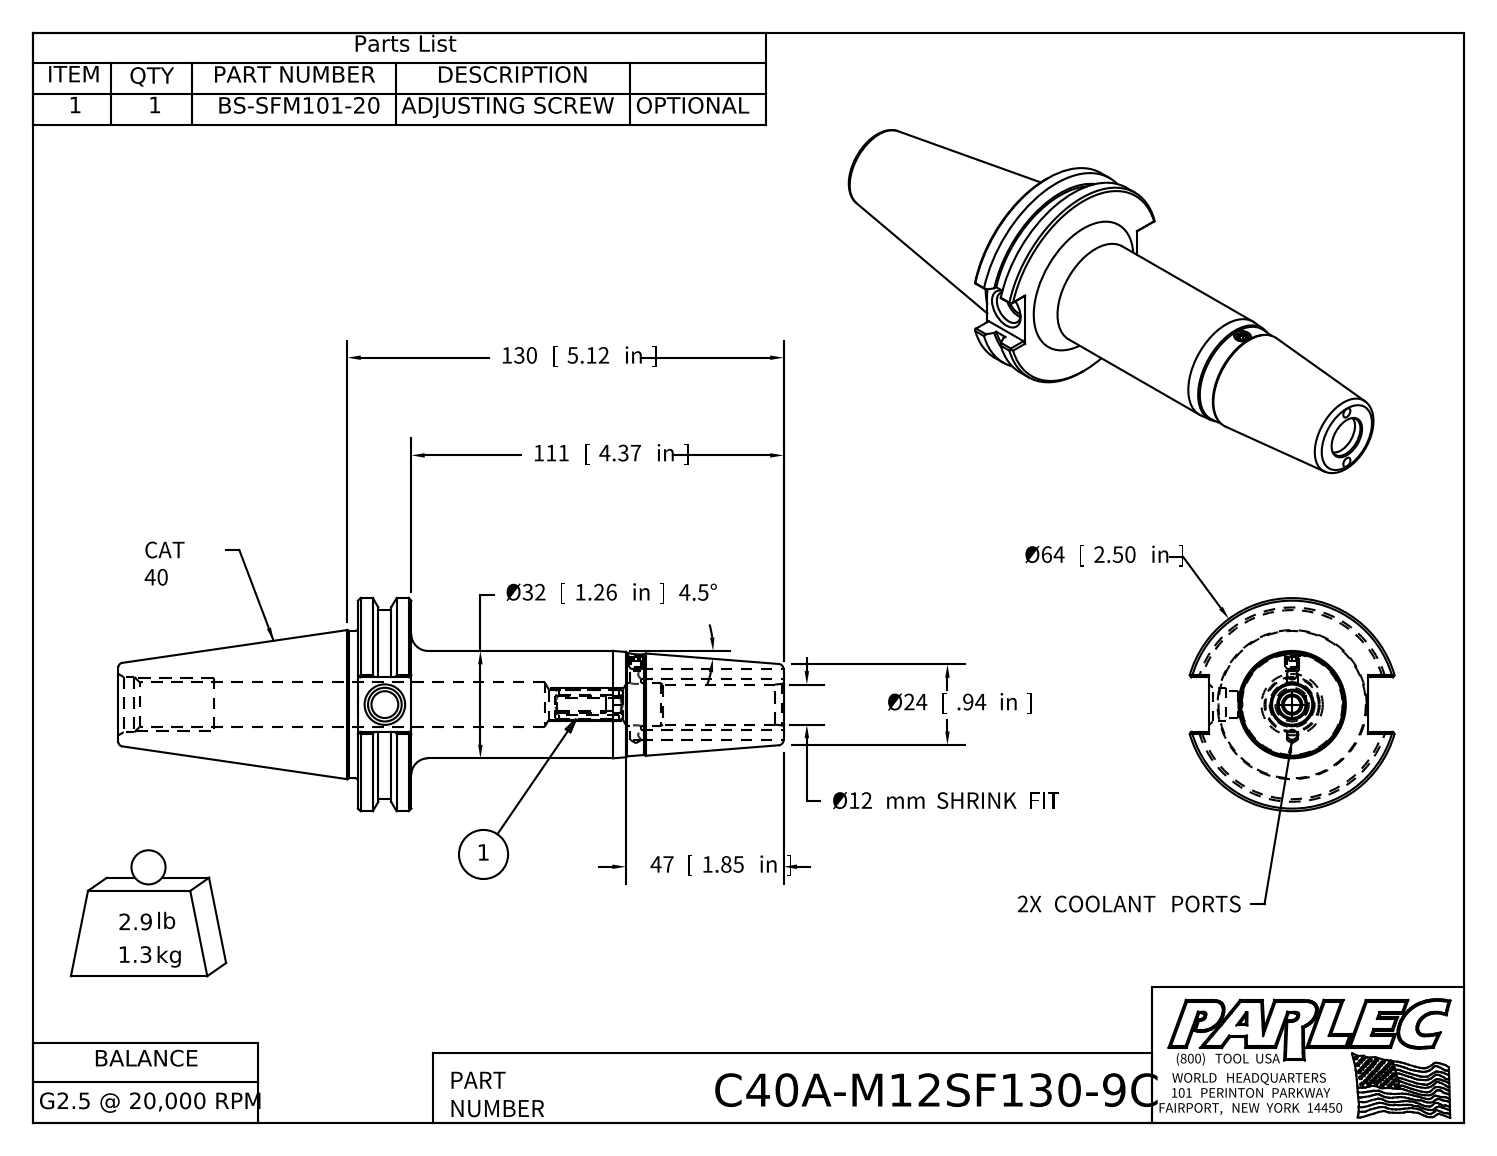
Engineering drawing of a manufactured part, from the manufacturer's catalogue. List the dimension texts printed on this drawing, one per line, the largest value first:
130 [ 5.12 in ]
111 [ 4.37 in ]
Ø64 [ 2.50 in ]
47 [ 1.85 in ]
Ø32 [ 1.26 in ]
Ø24 [ .94 in ]
Ø12 mm SHRINK FIT
4.5°
